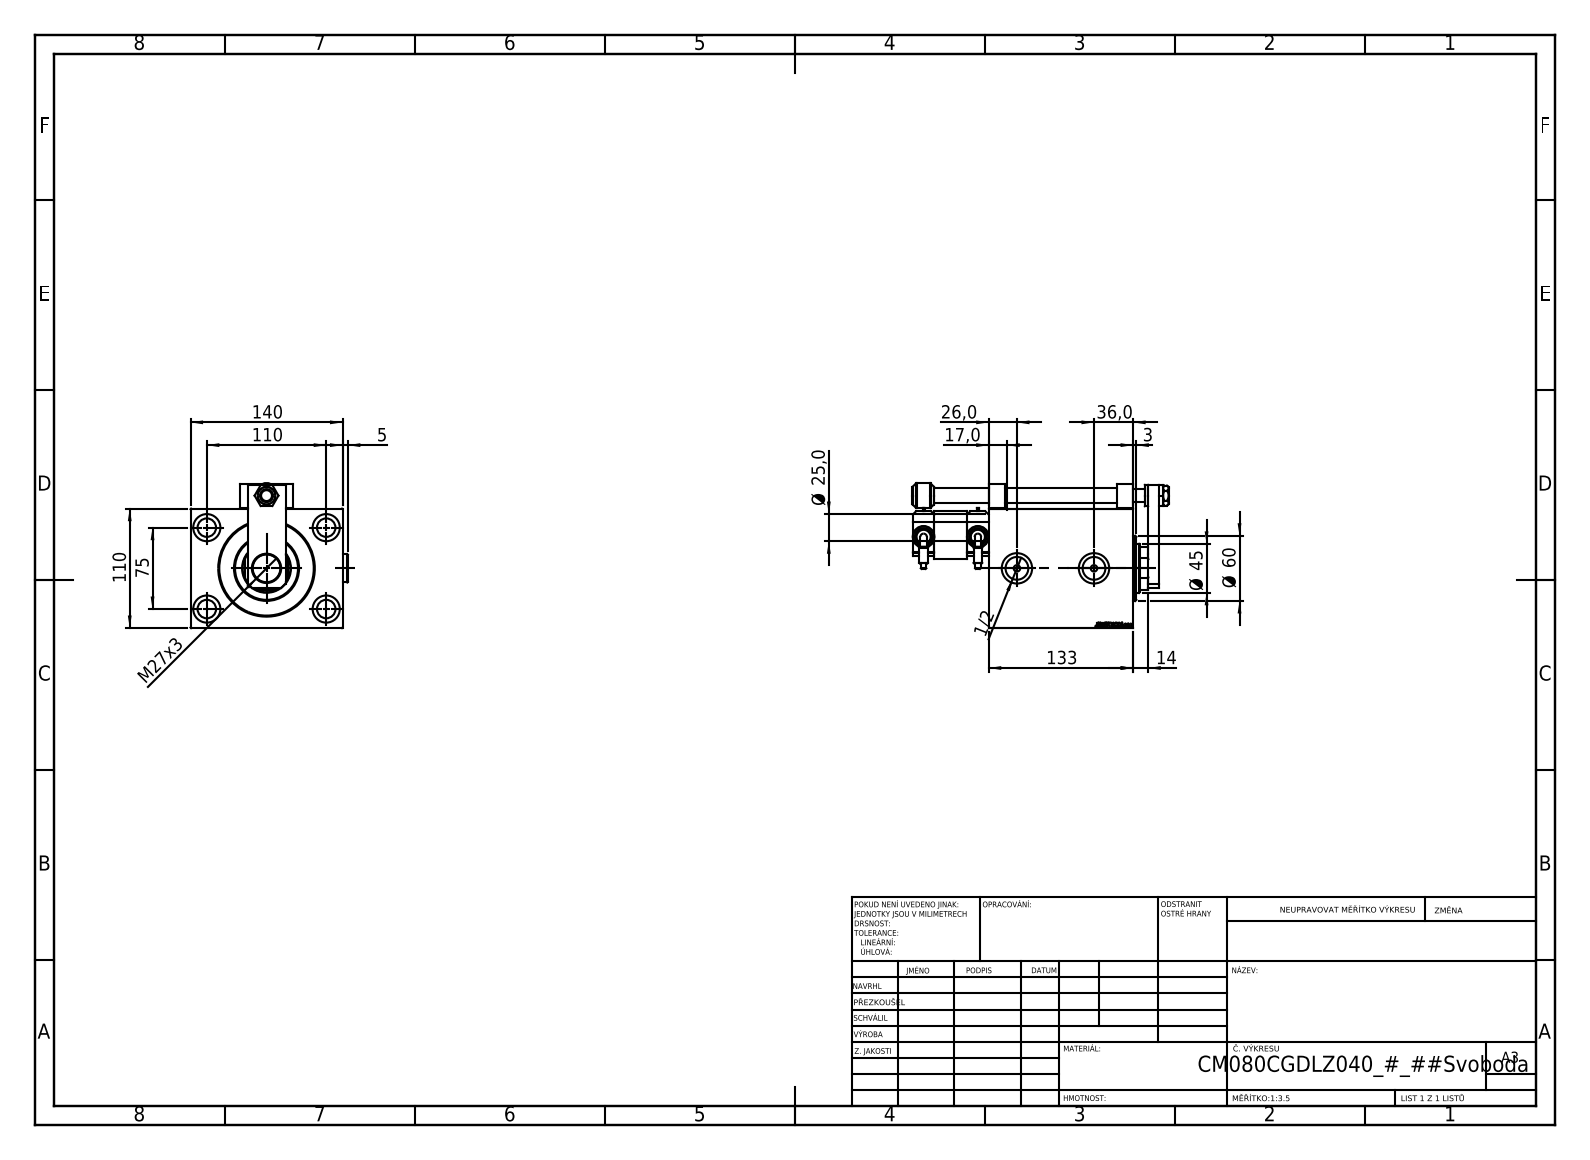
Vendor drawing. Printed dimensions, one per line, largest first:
140
133
110
110
75
Ø 60
Ø 45
36,0
M27x3
26,0
Ø 25,0
17,0
14
5
3
1/2
